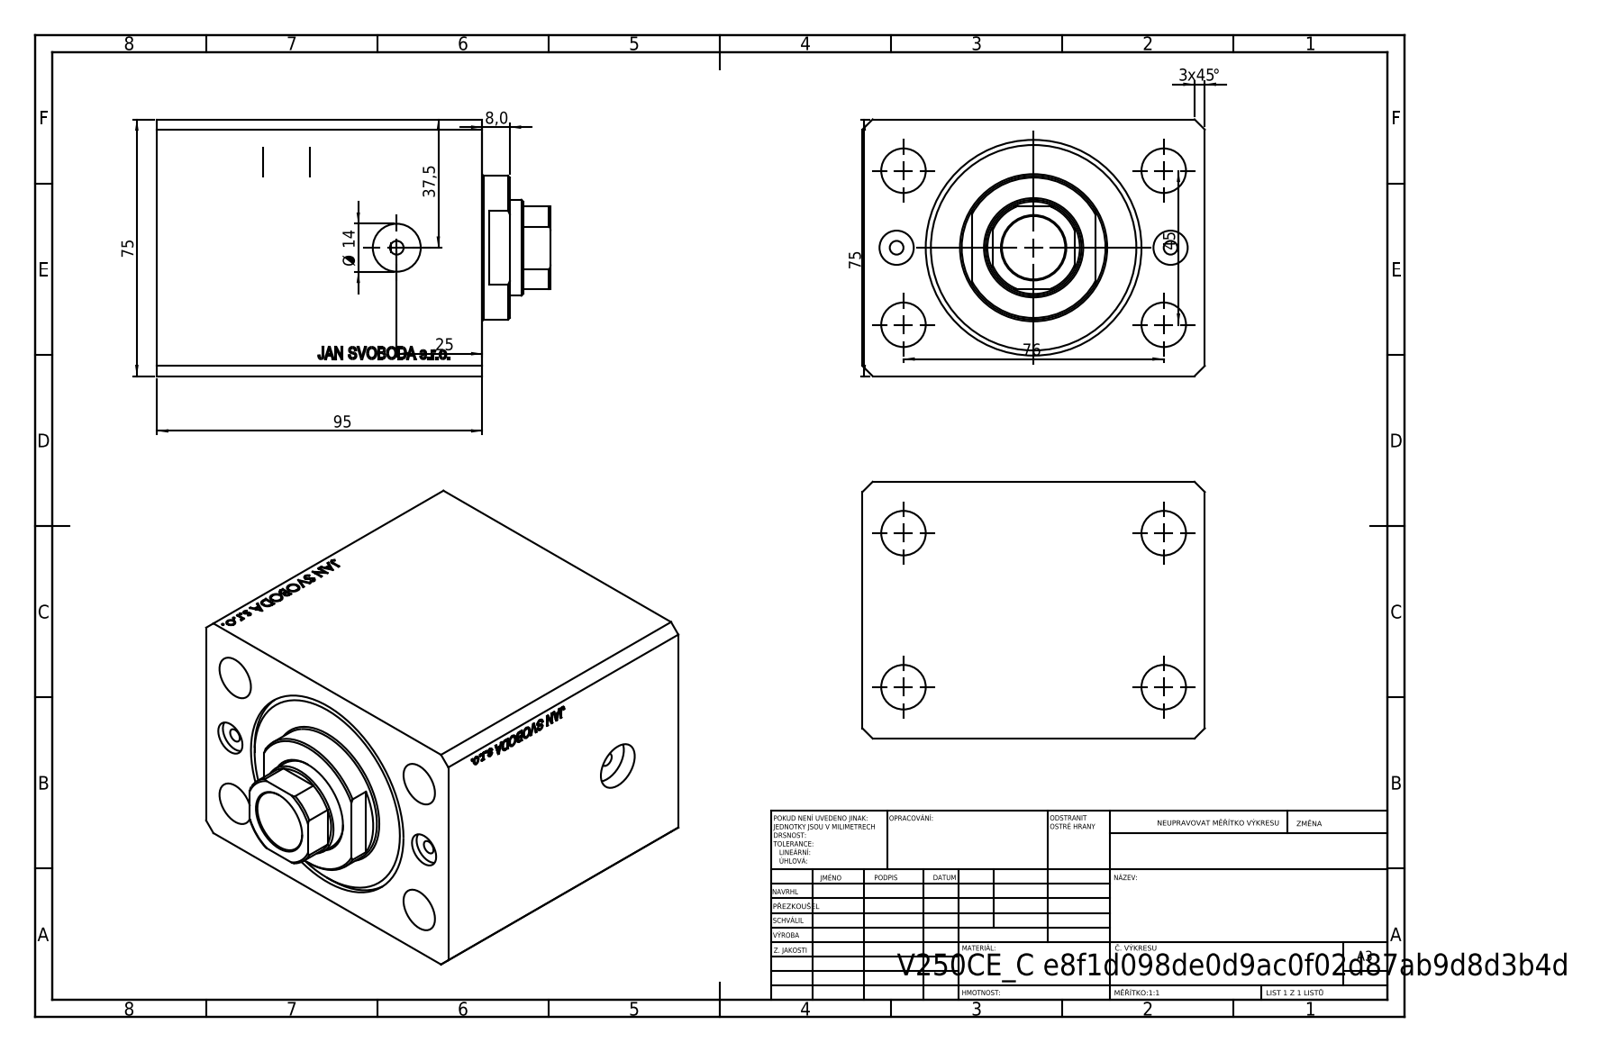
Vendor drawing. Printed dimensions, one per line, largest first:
95
76
75
75
3 x45 °
45
37,5
25
Ø 14
8,0
